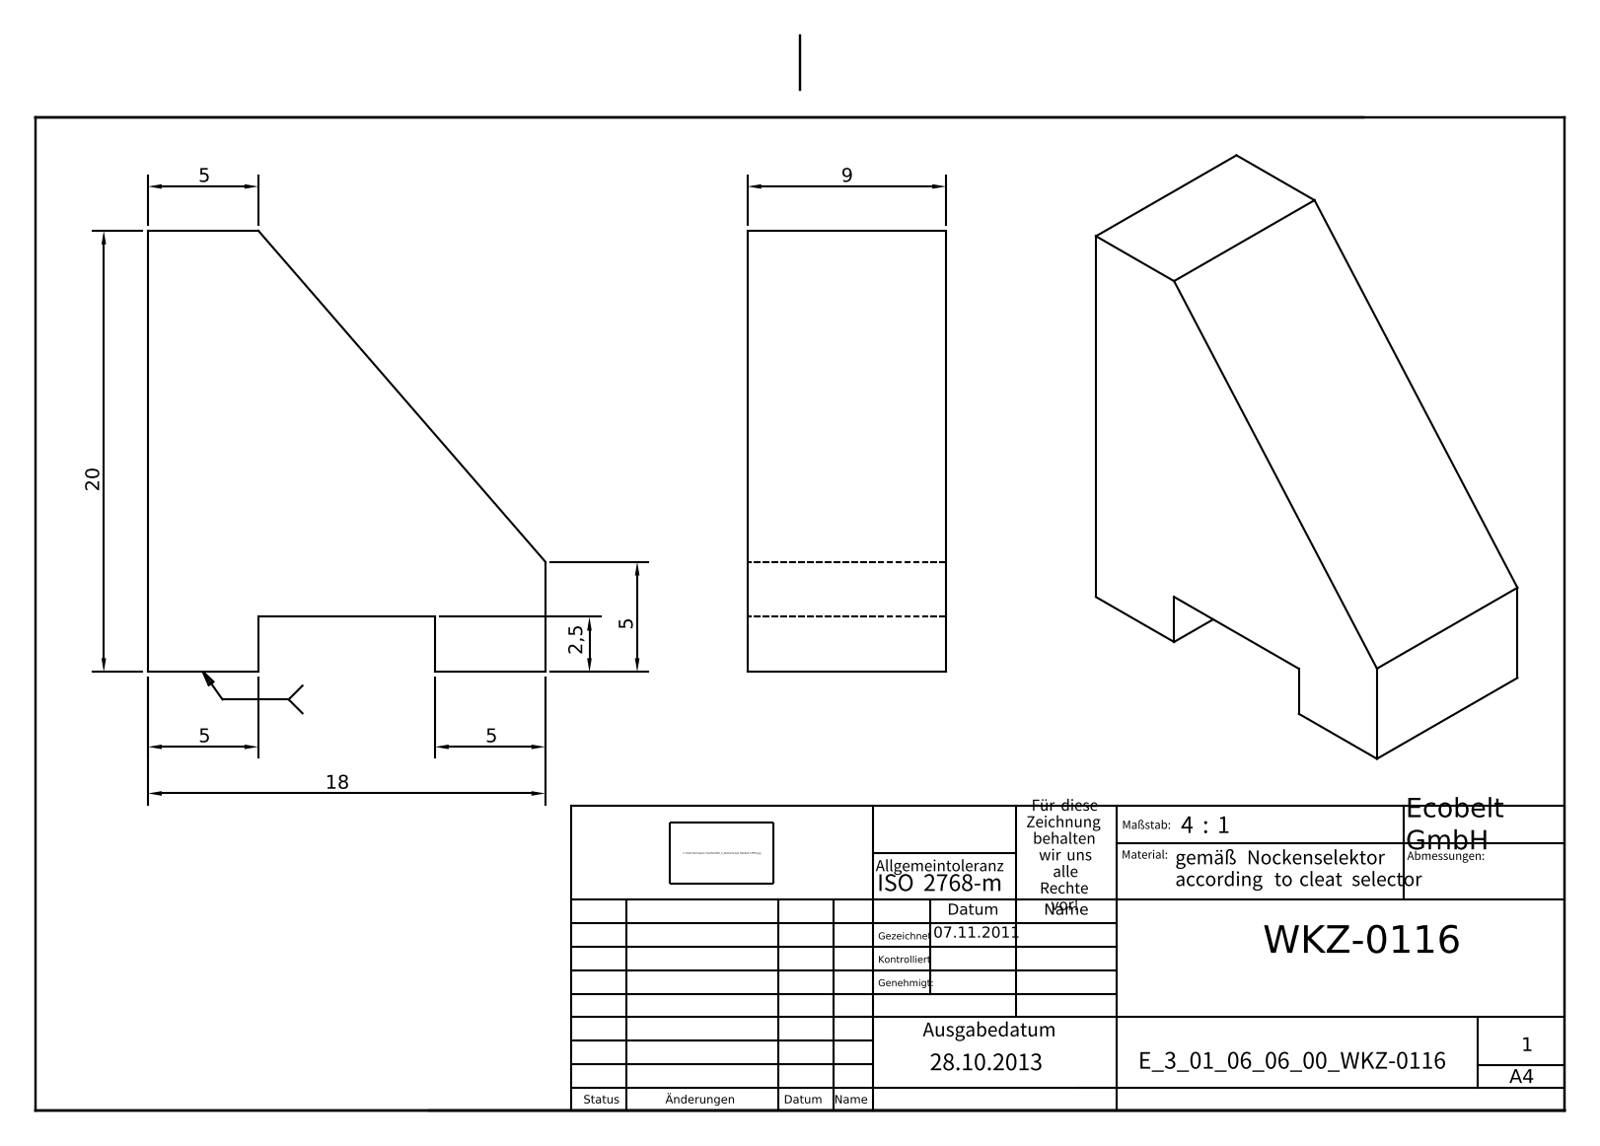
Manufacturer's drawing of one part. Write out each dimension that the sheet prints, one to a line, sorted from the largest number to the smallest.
20
18
9
5
5
5
5
2,5
